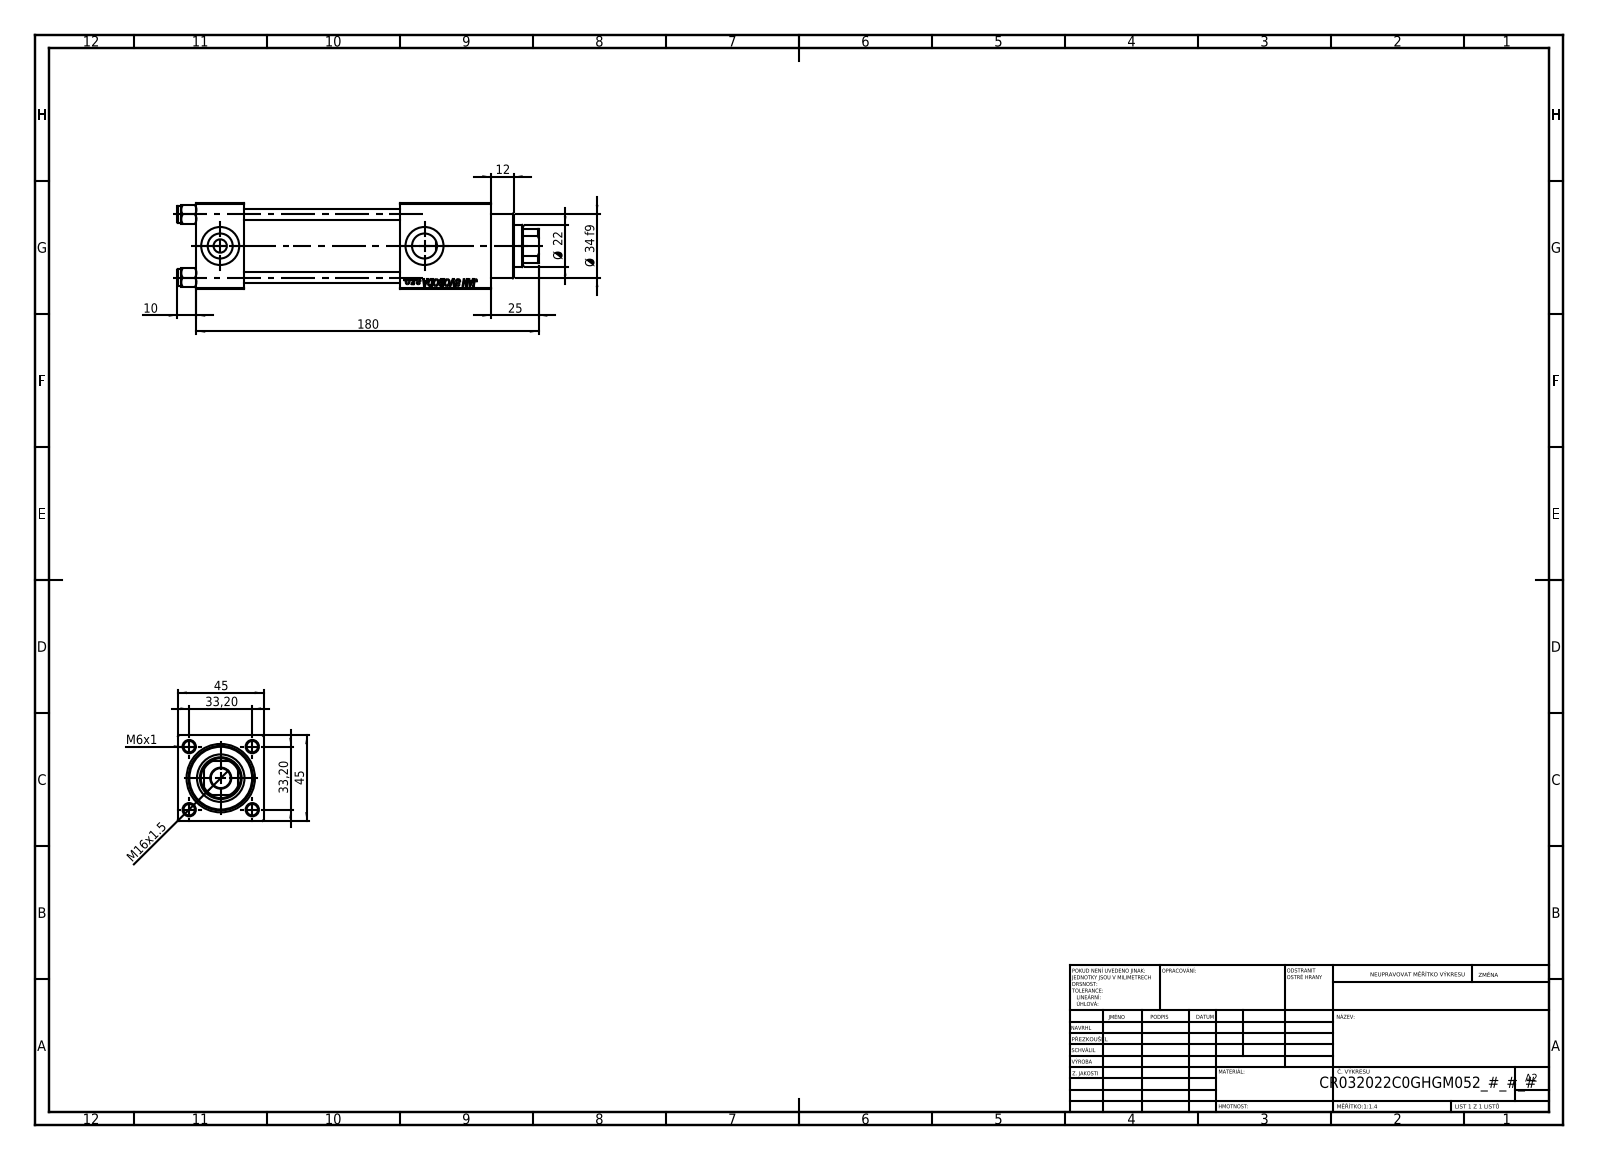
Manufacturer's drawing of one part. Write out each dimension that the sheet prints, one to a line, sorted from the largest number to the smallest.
180
45
45
Ø 34 f9
33,20
33,20
25
Ø 22
M16x1.5
12
10
M6x1
